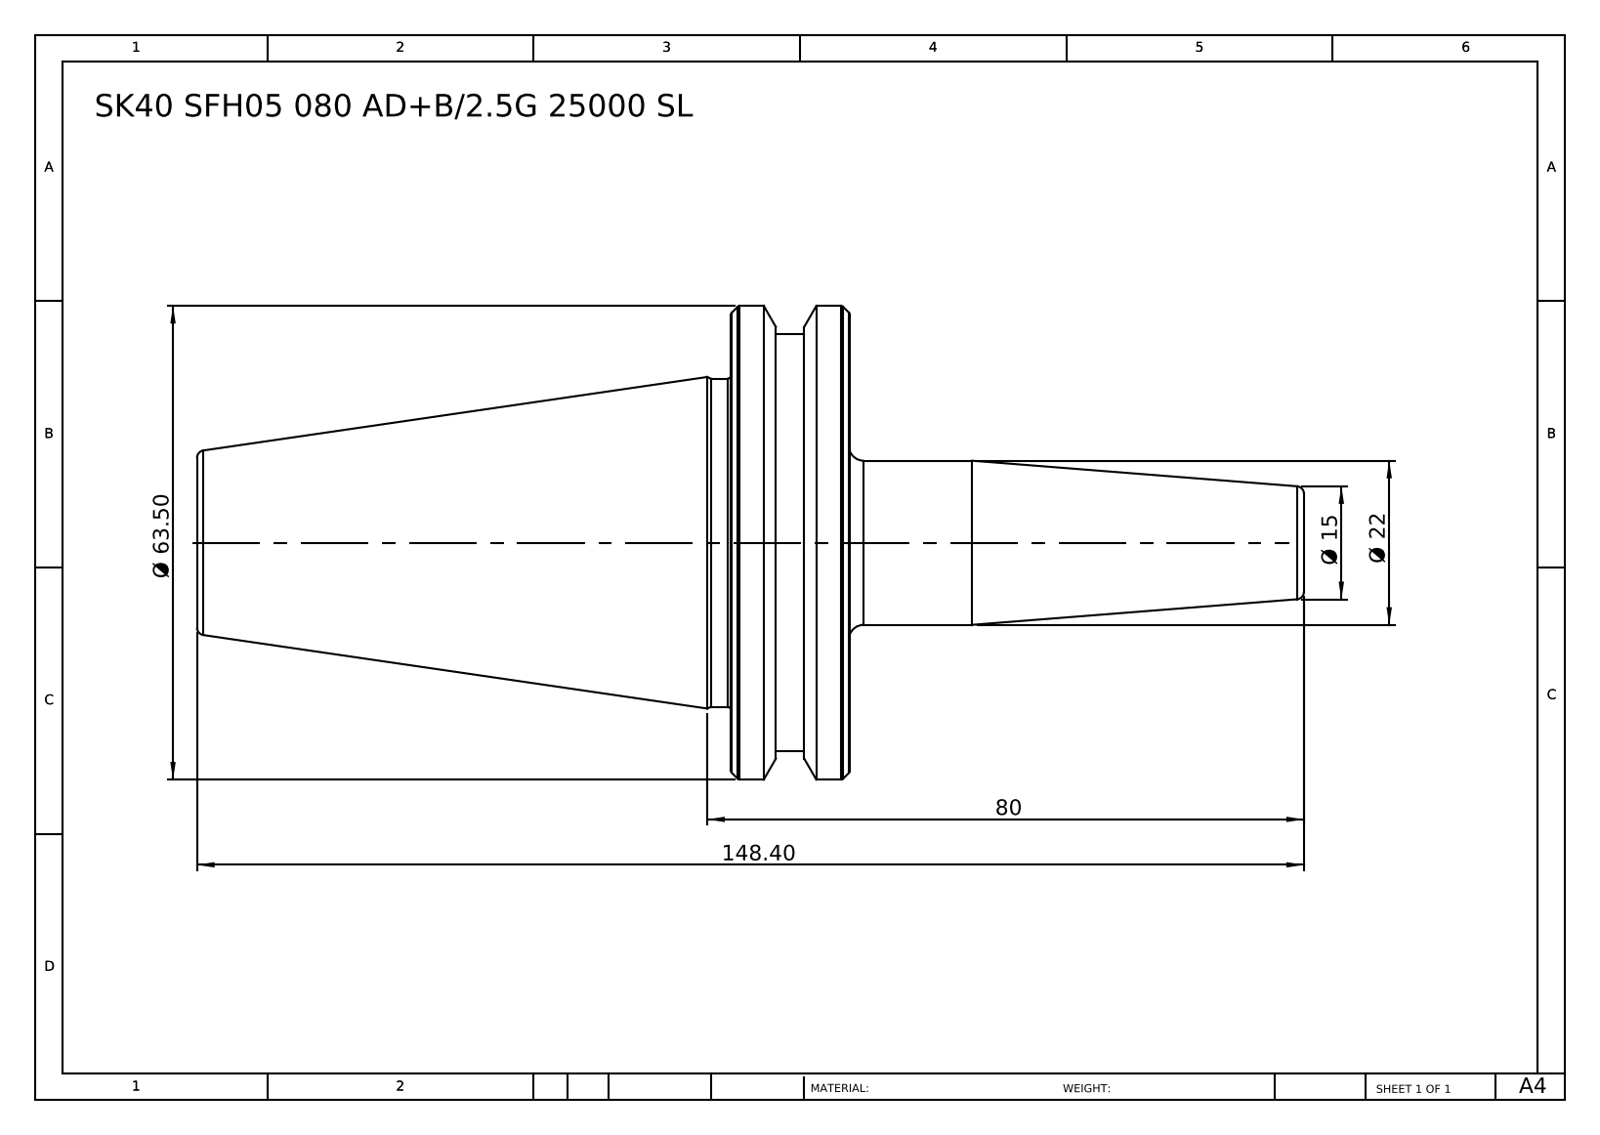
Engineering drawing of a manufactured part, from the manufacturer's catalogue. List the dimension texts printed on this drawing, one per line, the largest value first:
148.40
80
Ø 63.50
Ø 22
Ø 15
